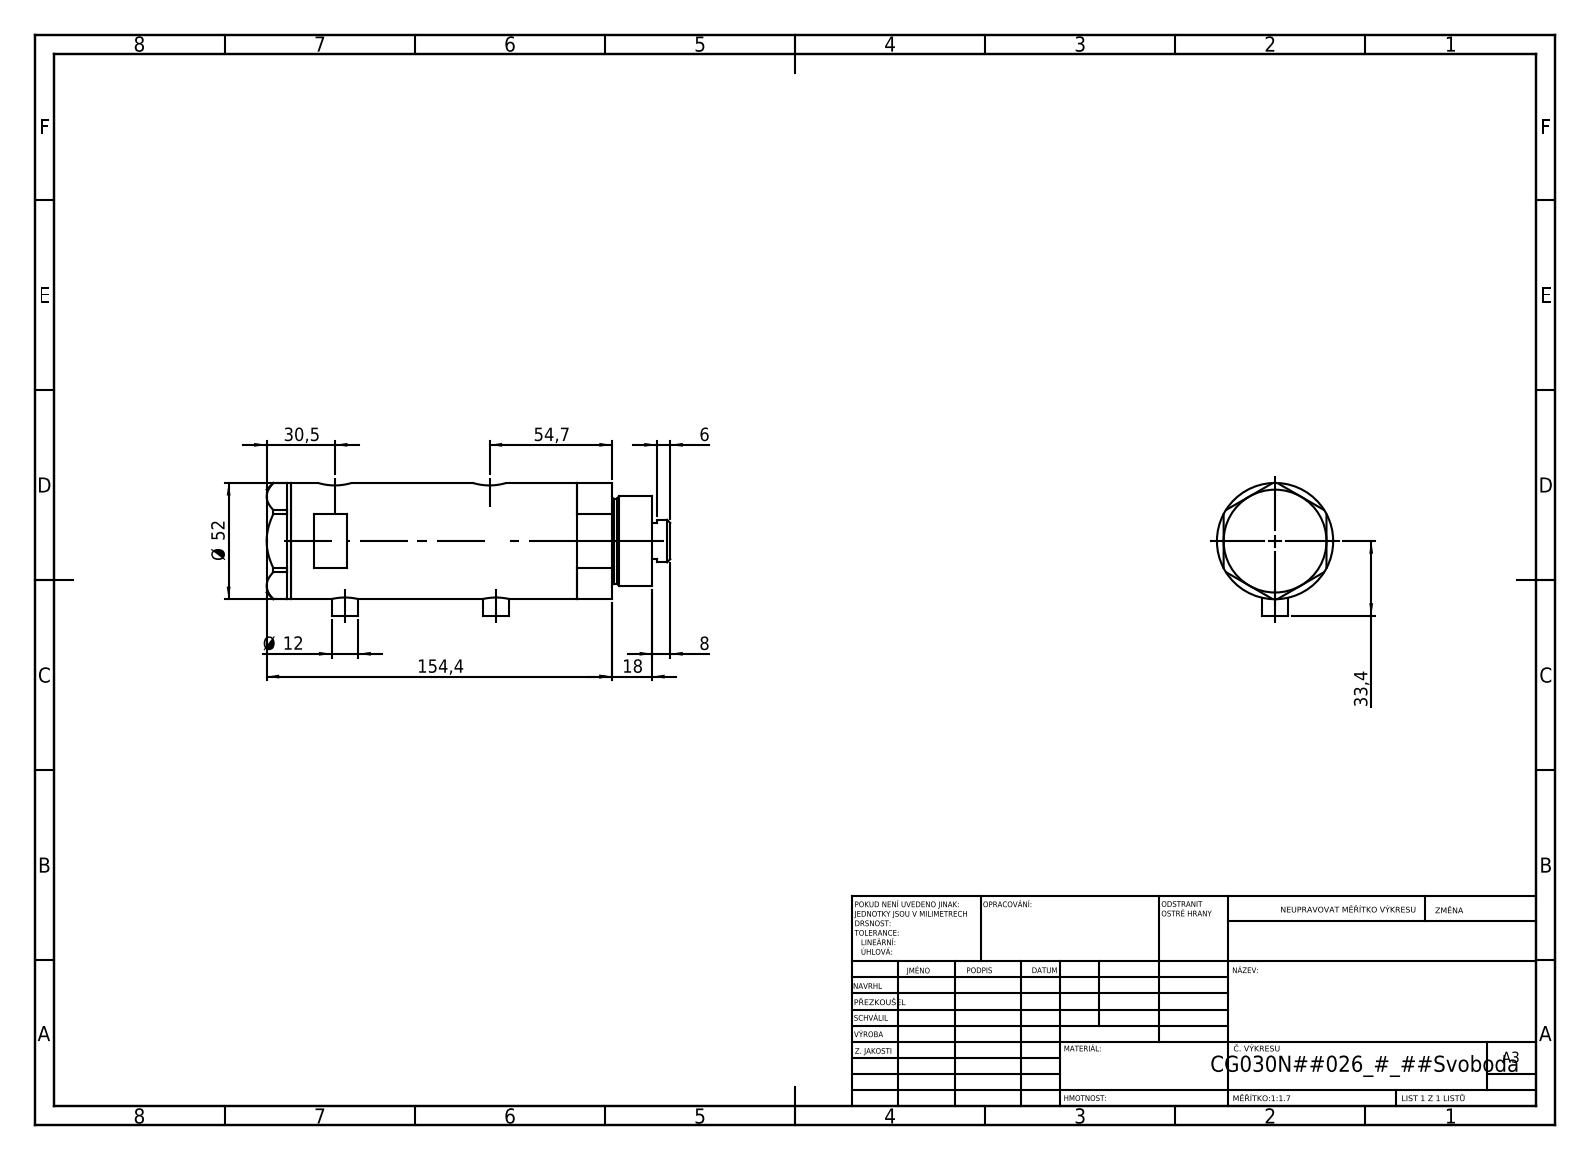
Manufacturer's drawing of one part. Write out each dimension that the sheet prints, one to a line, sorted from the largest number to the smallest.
154,4
54,7
Ø 52
33,4
30,5
18
Ø 12
8
6
